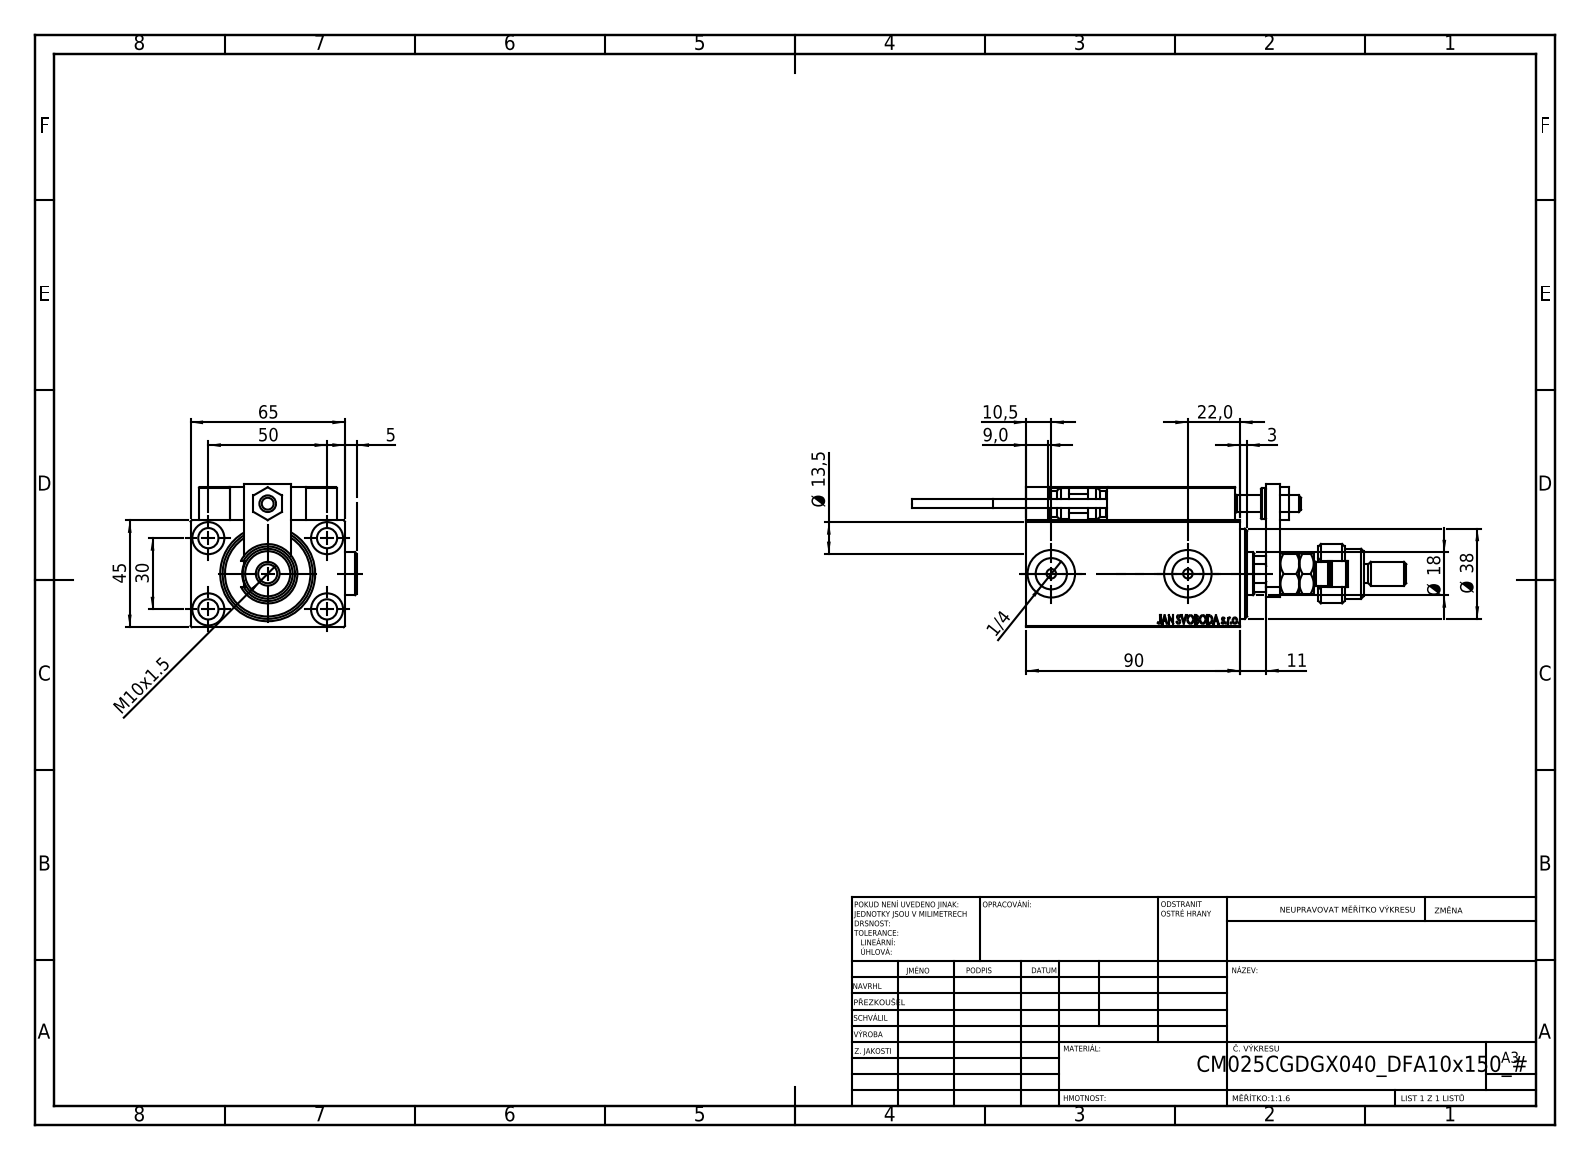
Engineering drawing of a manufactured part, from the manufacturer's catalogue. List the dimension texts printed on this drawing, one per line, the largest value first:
90
65
50
45
Ø 38
30
22,0
Ø 18
Ø 13,5
11
10,5
M10x1.5
9,0
5
3
1/4
